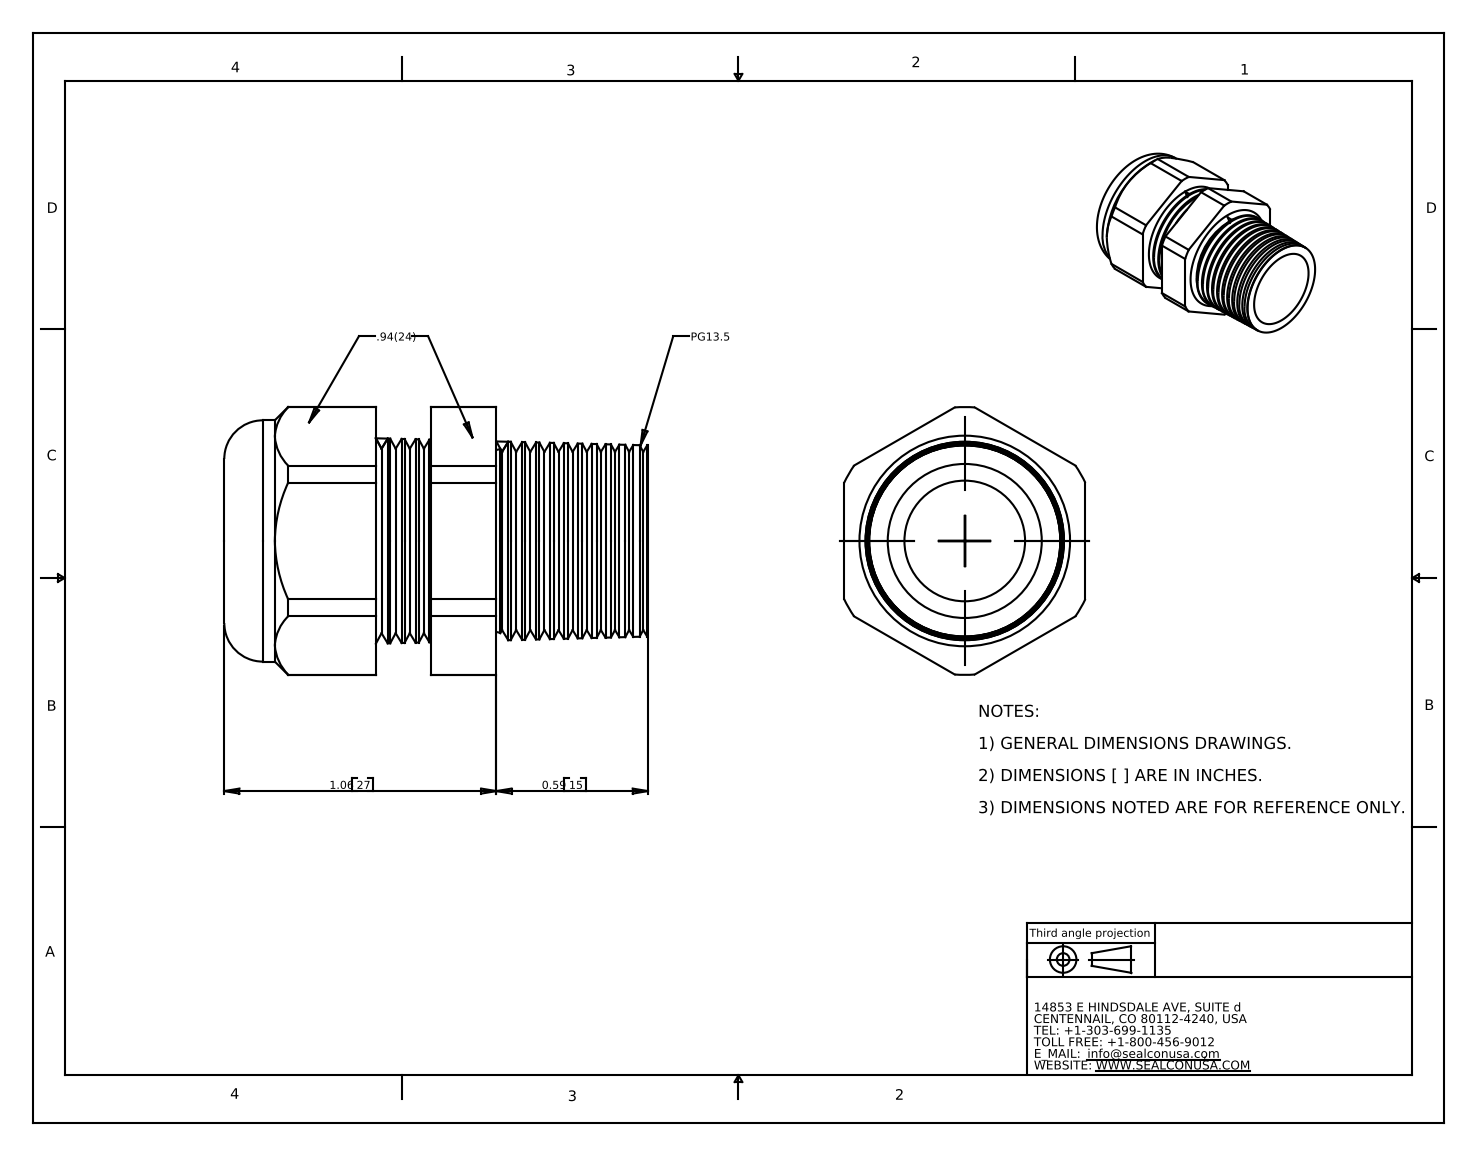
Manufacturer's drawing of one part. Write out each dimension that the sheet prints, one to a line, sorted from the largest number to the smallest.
1.06 27
0.59 15
